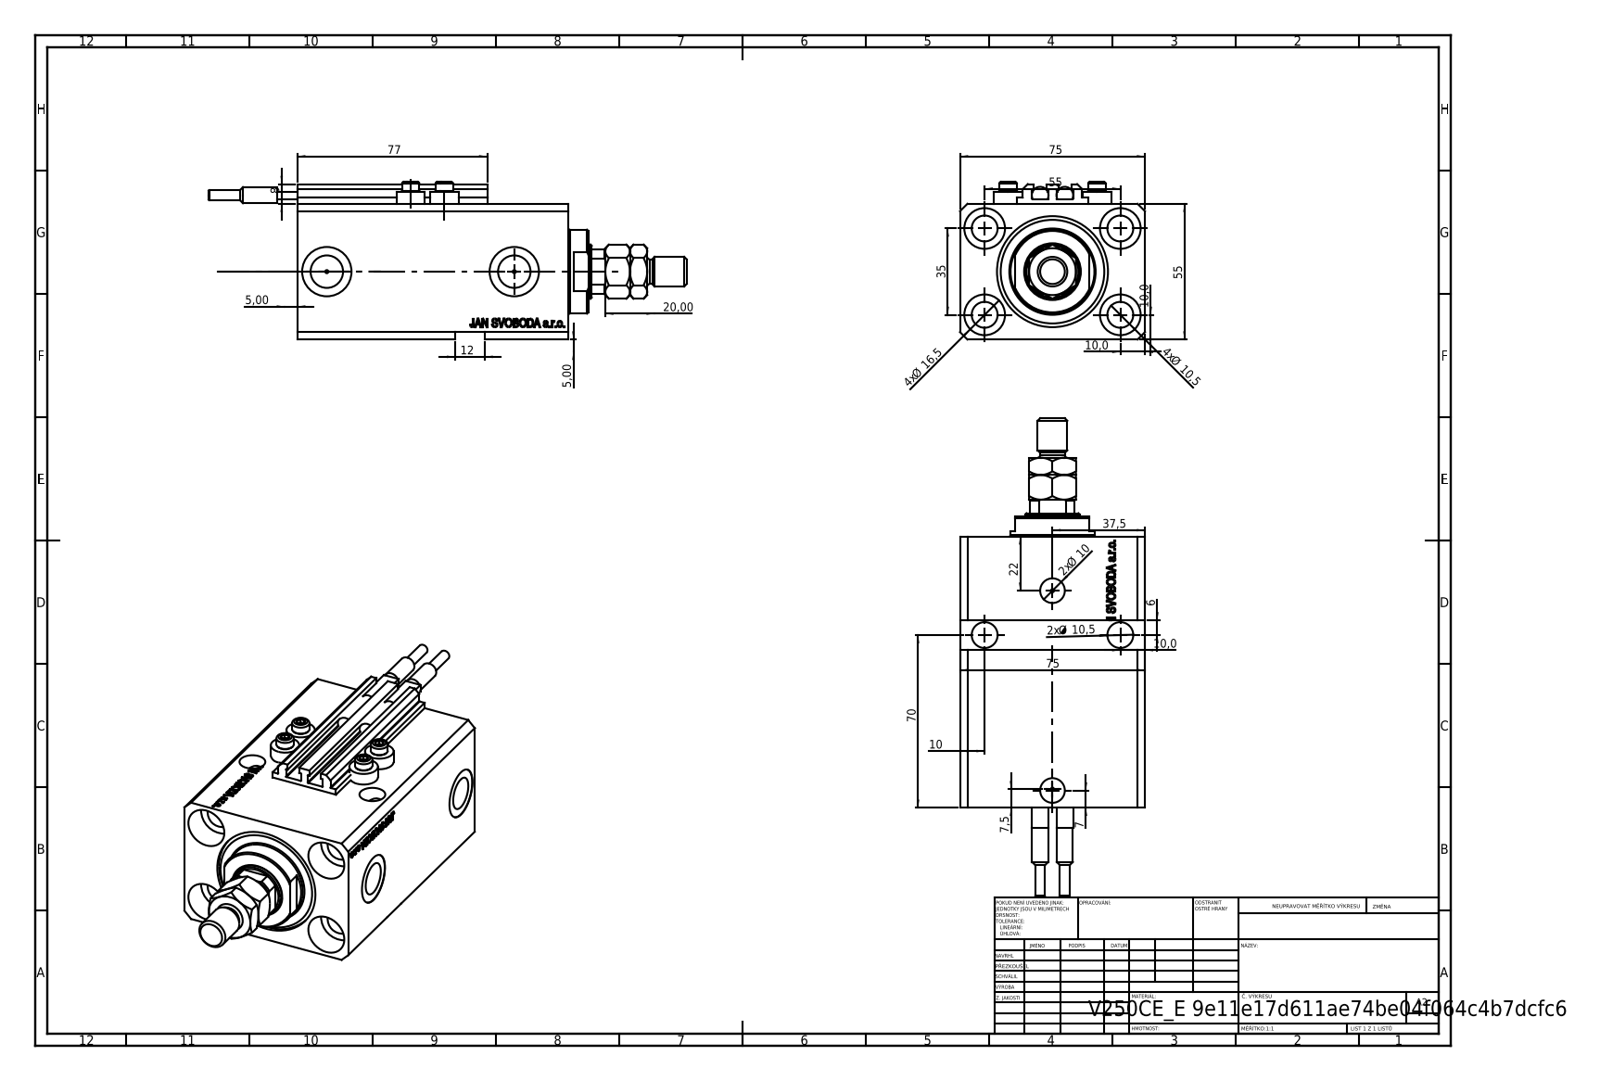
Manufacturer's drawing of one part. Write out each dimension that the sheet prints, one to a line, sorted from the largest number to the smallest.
77
75
75
70
55
55
37,5
35
22
20,00
4x Ø 16,5
12
4x Ø 10,5
2x Ø 10,5
10,0
10,0
2x Ø 10
10,0
10
8
7,5
7
6
5,00
5,00
